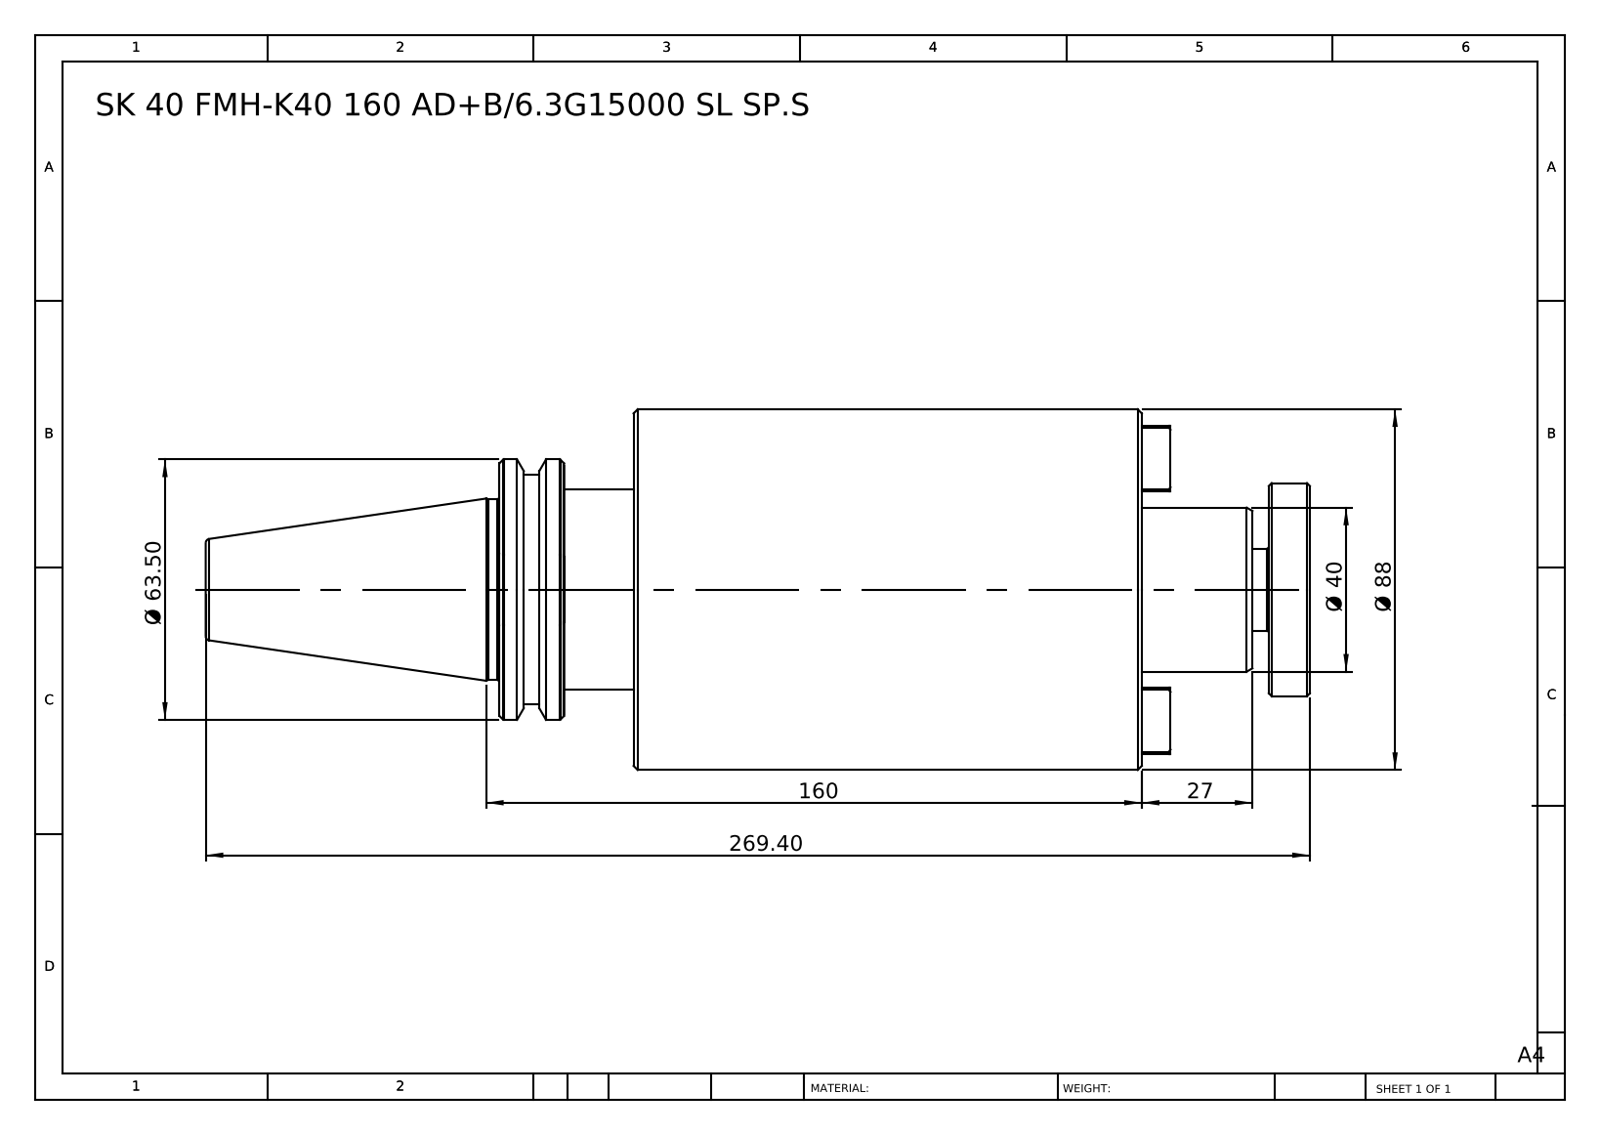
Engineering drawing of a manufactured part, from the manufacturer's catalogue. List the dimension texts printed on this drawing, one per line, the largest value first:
269.40
160
Ø 88
Ø 63.50
Ø 40
27
